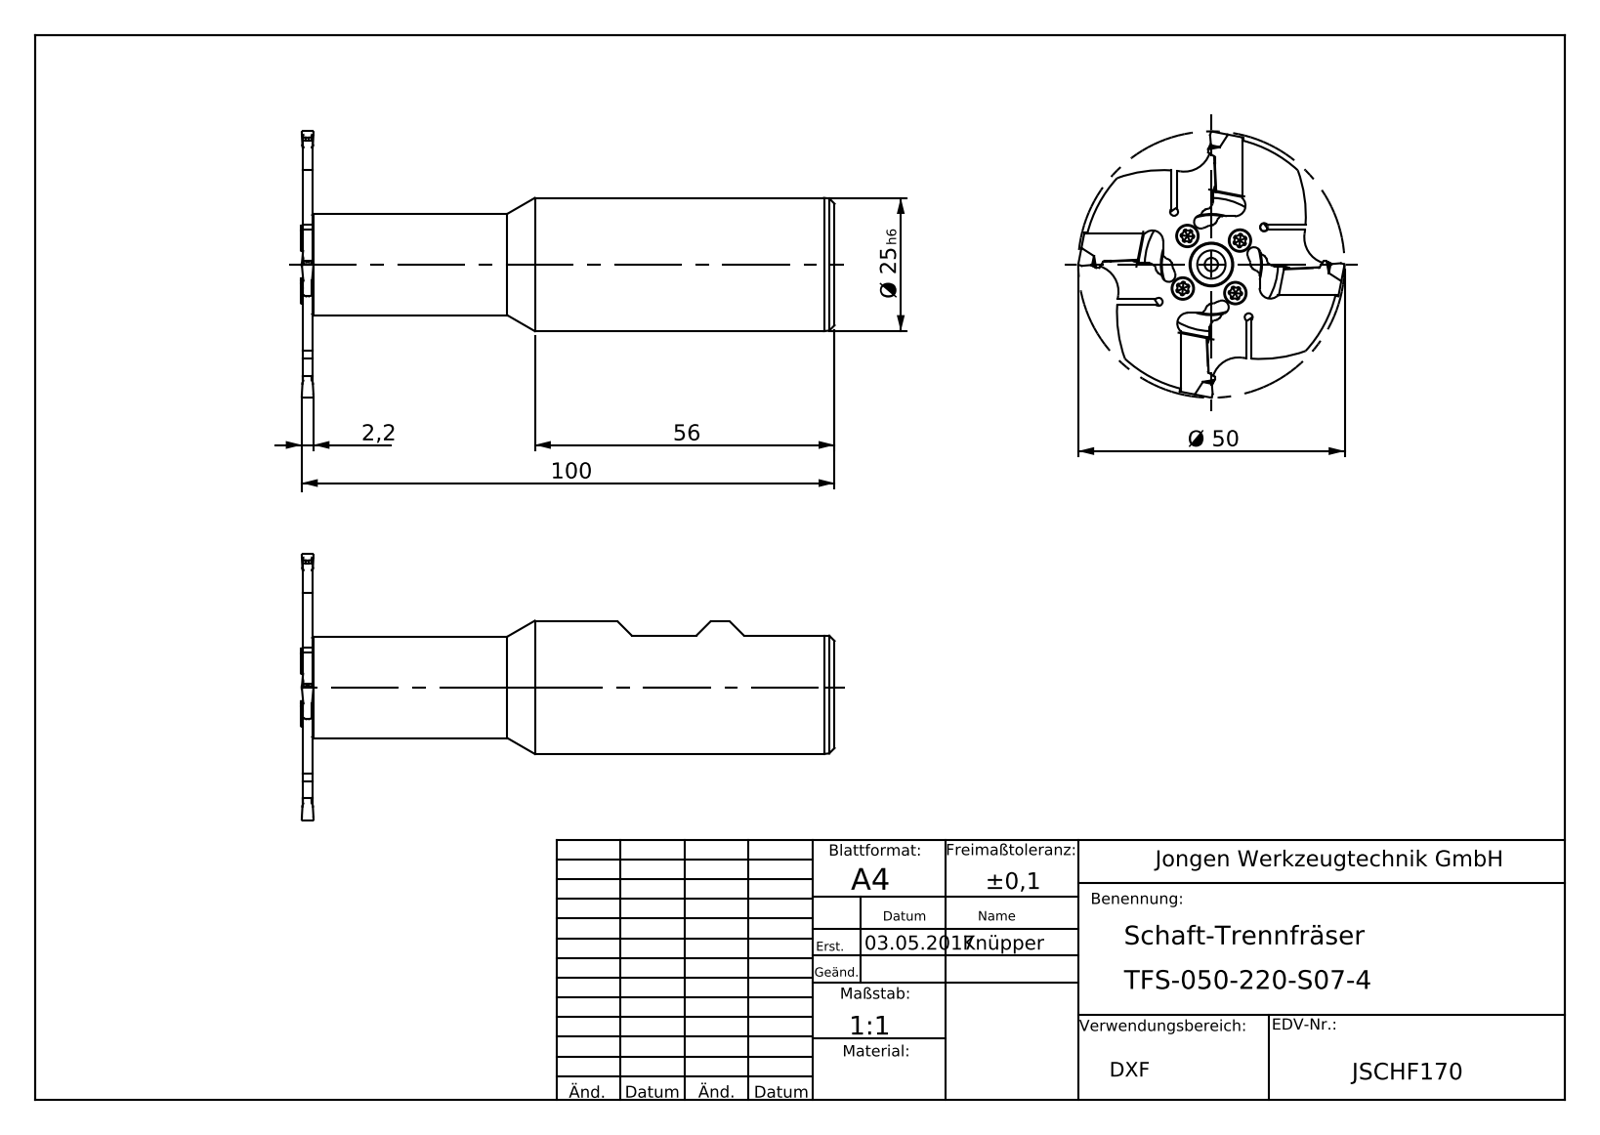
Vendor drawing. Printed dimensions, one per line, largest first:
100
56
Ø 50
Ø 25 h6
2,2
